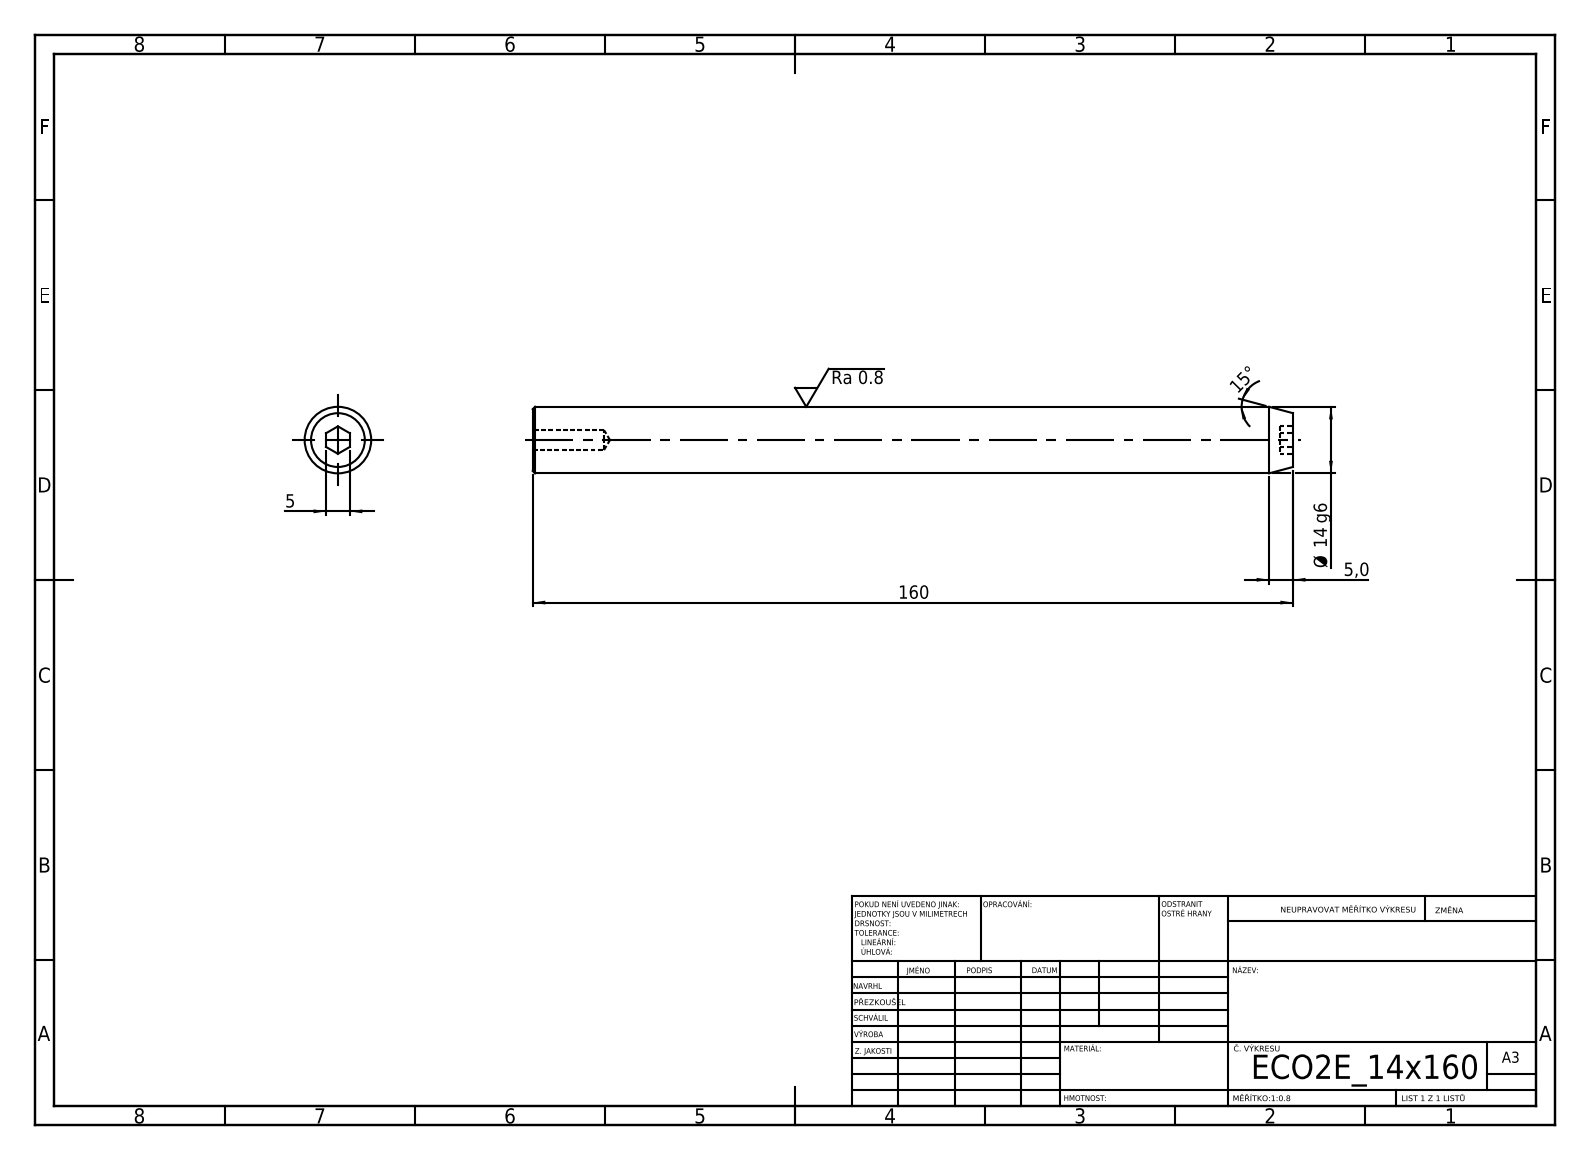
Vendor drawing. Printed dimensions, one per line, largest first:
160
15°
Ø 14 g6
5,0
5
